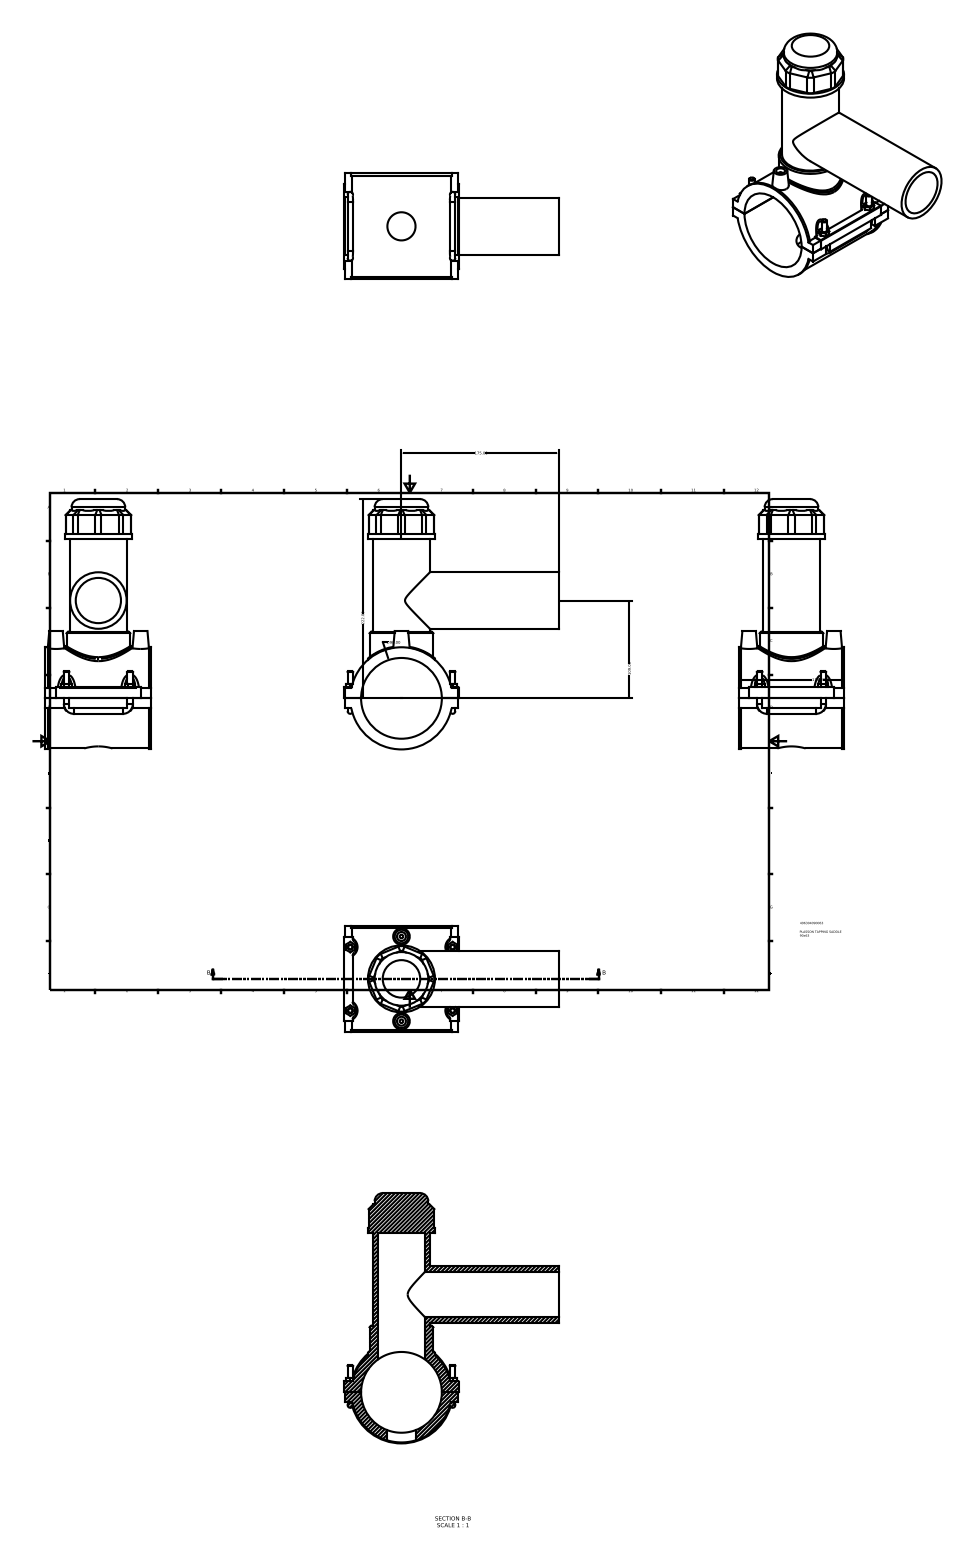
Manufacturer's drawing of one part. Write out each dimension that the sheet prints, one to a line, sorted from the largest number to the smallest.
222.00
175.00
118.00
109.00
∅90.00
